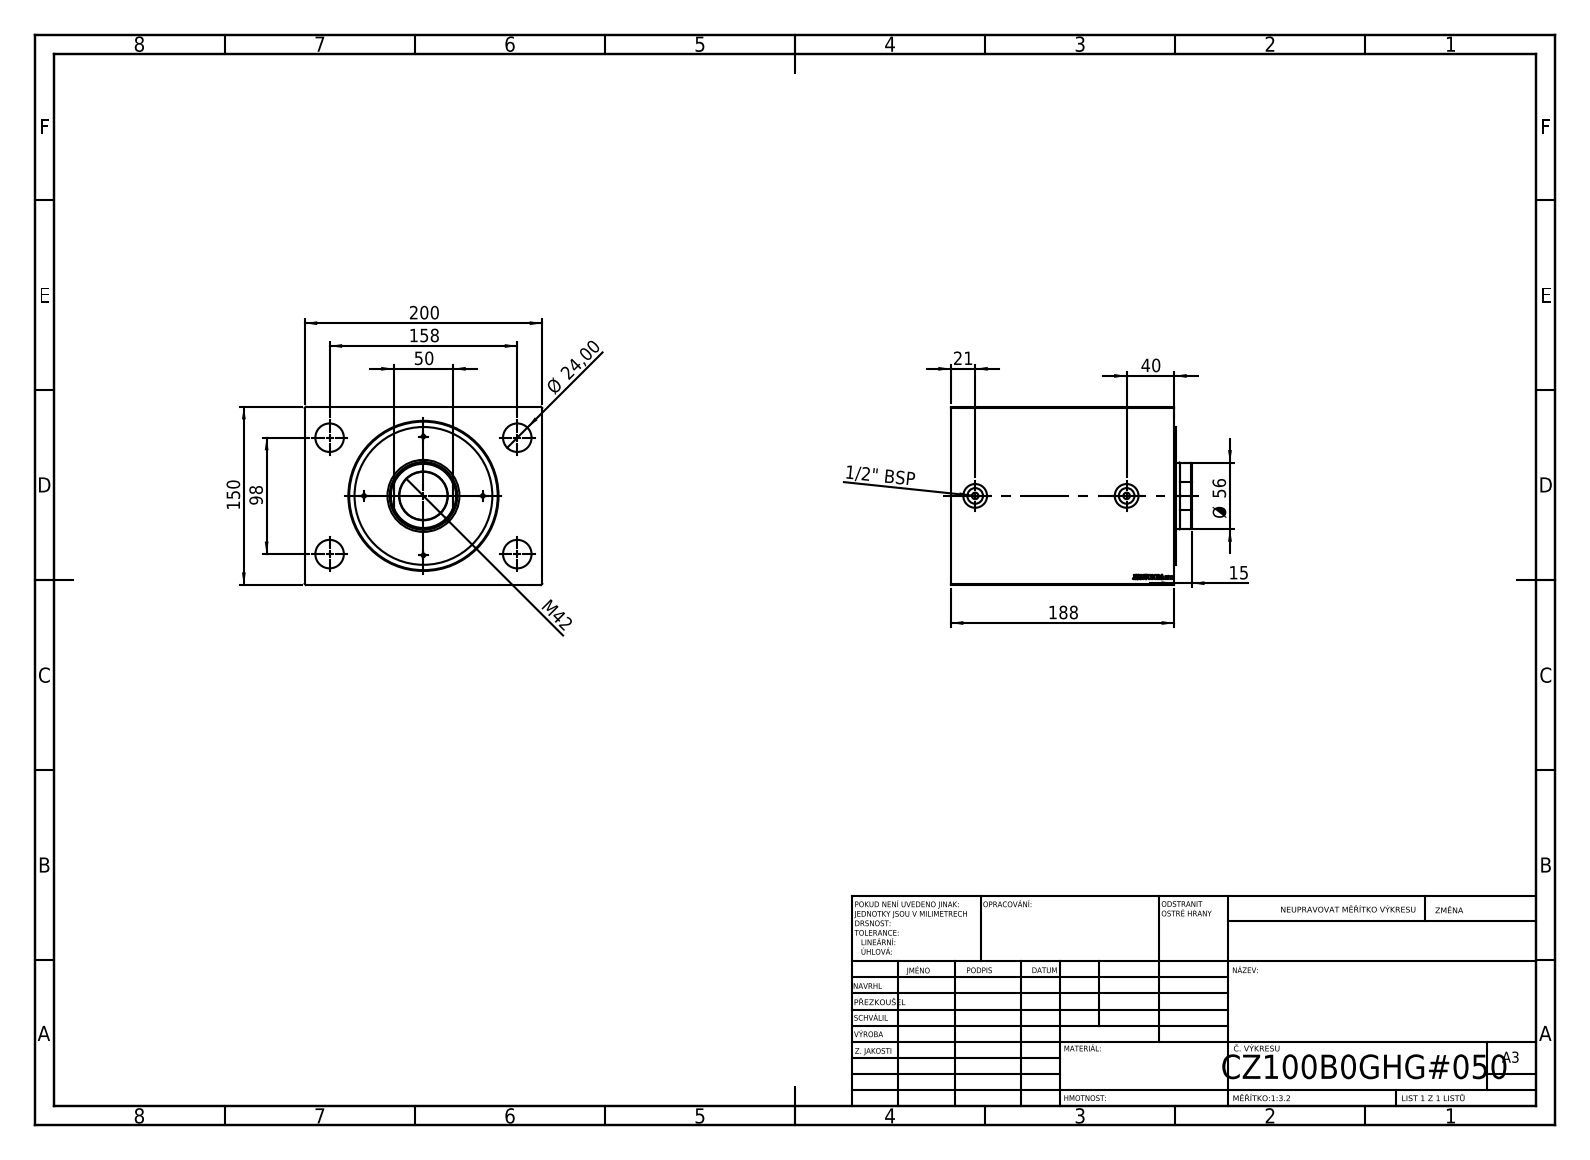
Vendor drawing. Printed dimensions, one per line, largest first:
200
188
158
150
98
Ø 56
50
M42
40
Ø 24,00
21
15
1/2" BSP
